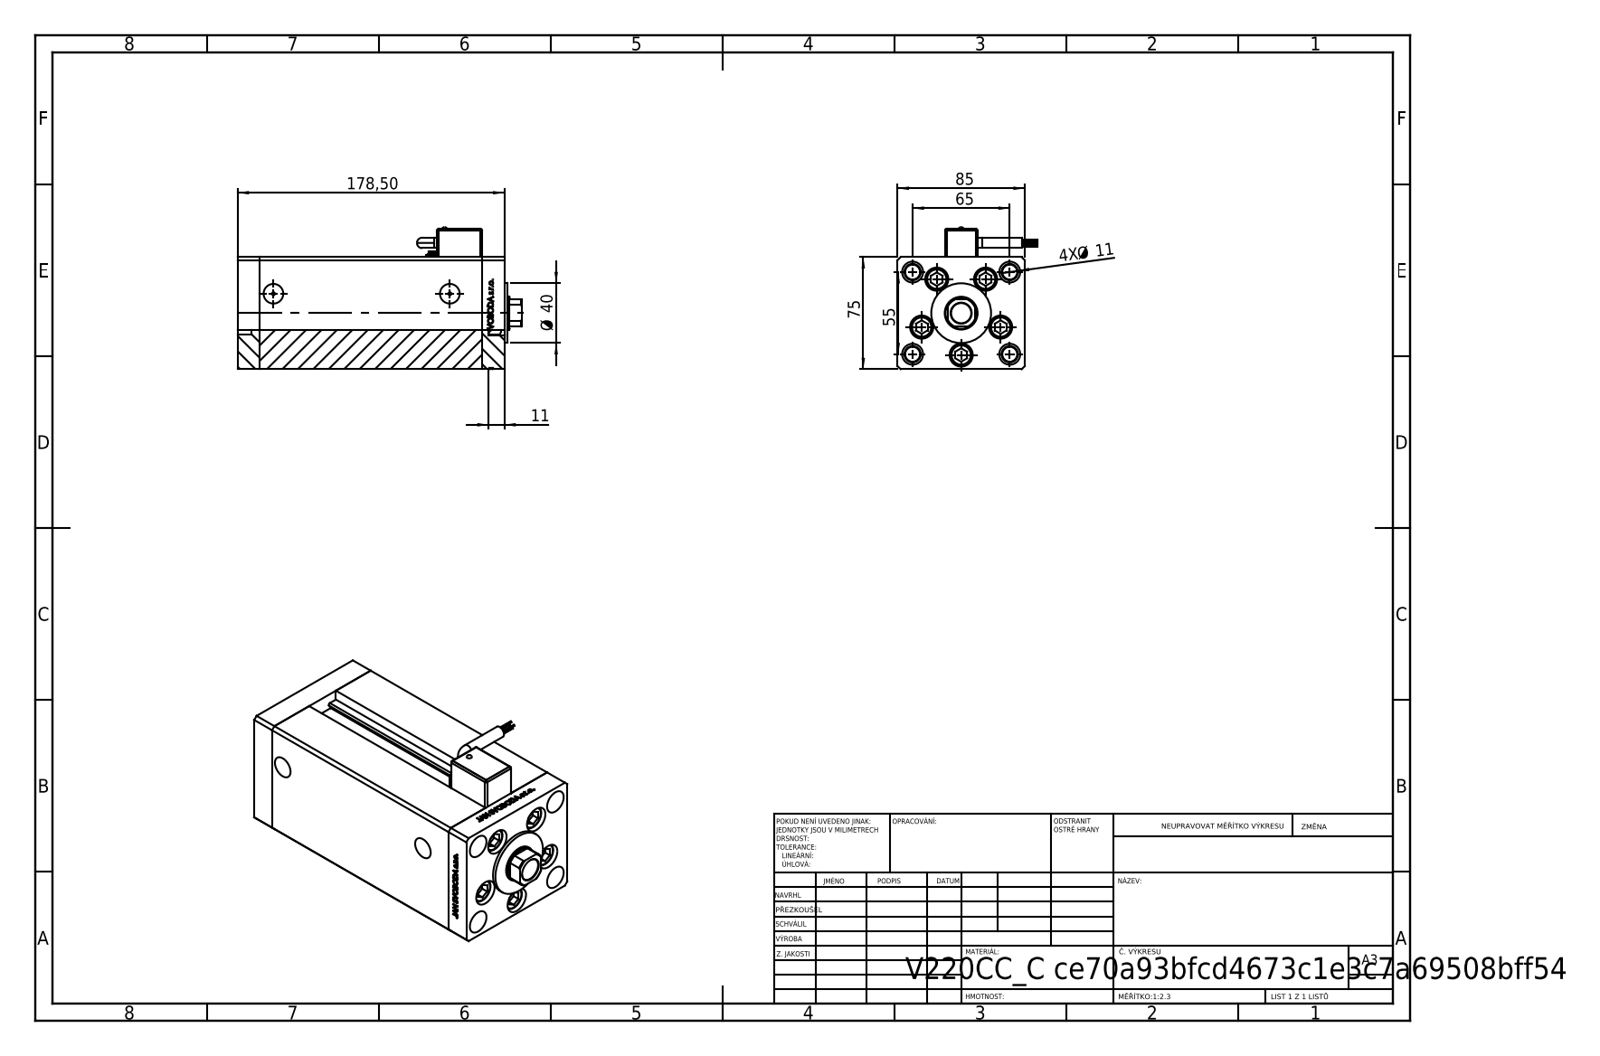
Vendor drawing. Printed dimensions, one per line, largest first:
178,50
85
75
65
55
Ø 40
11
4X Ø 11
